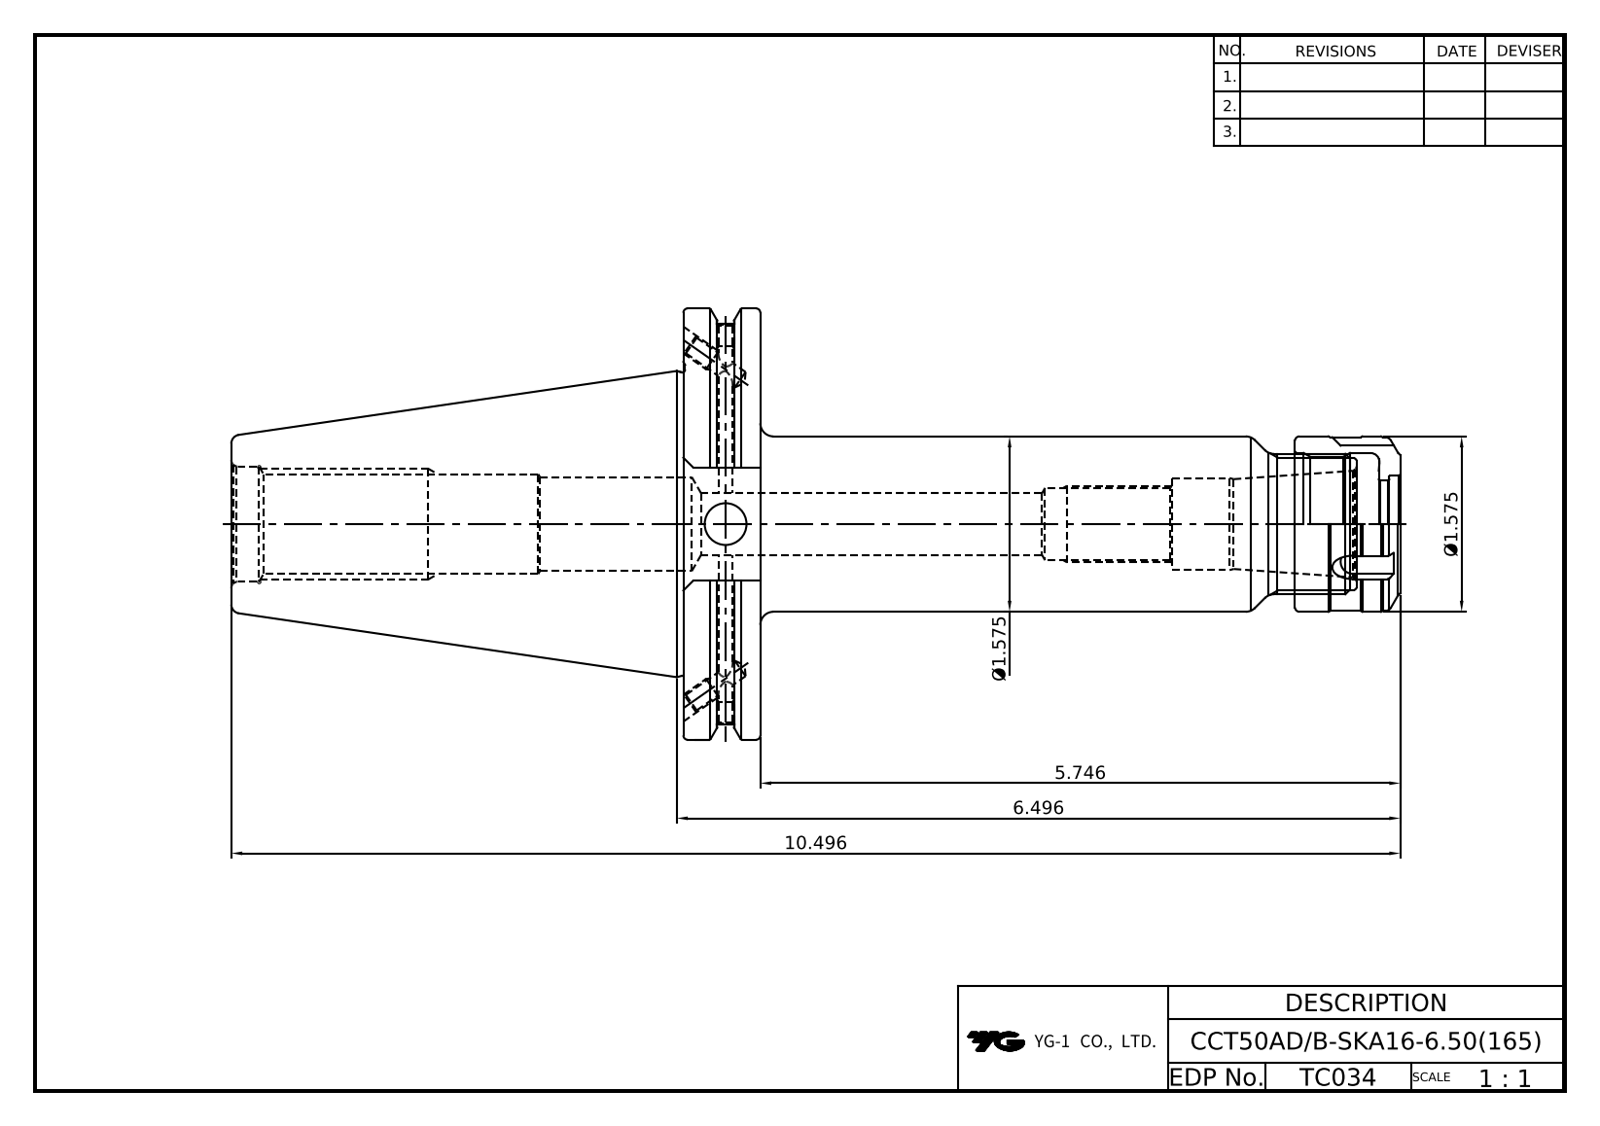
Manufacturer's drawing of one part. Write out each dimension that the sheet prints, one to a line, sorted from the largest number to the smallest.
10.496
6.496
5.746
Ø1.575
Ø1.575
